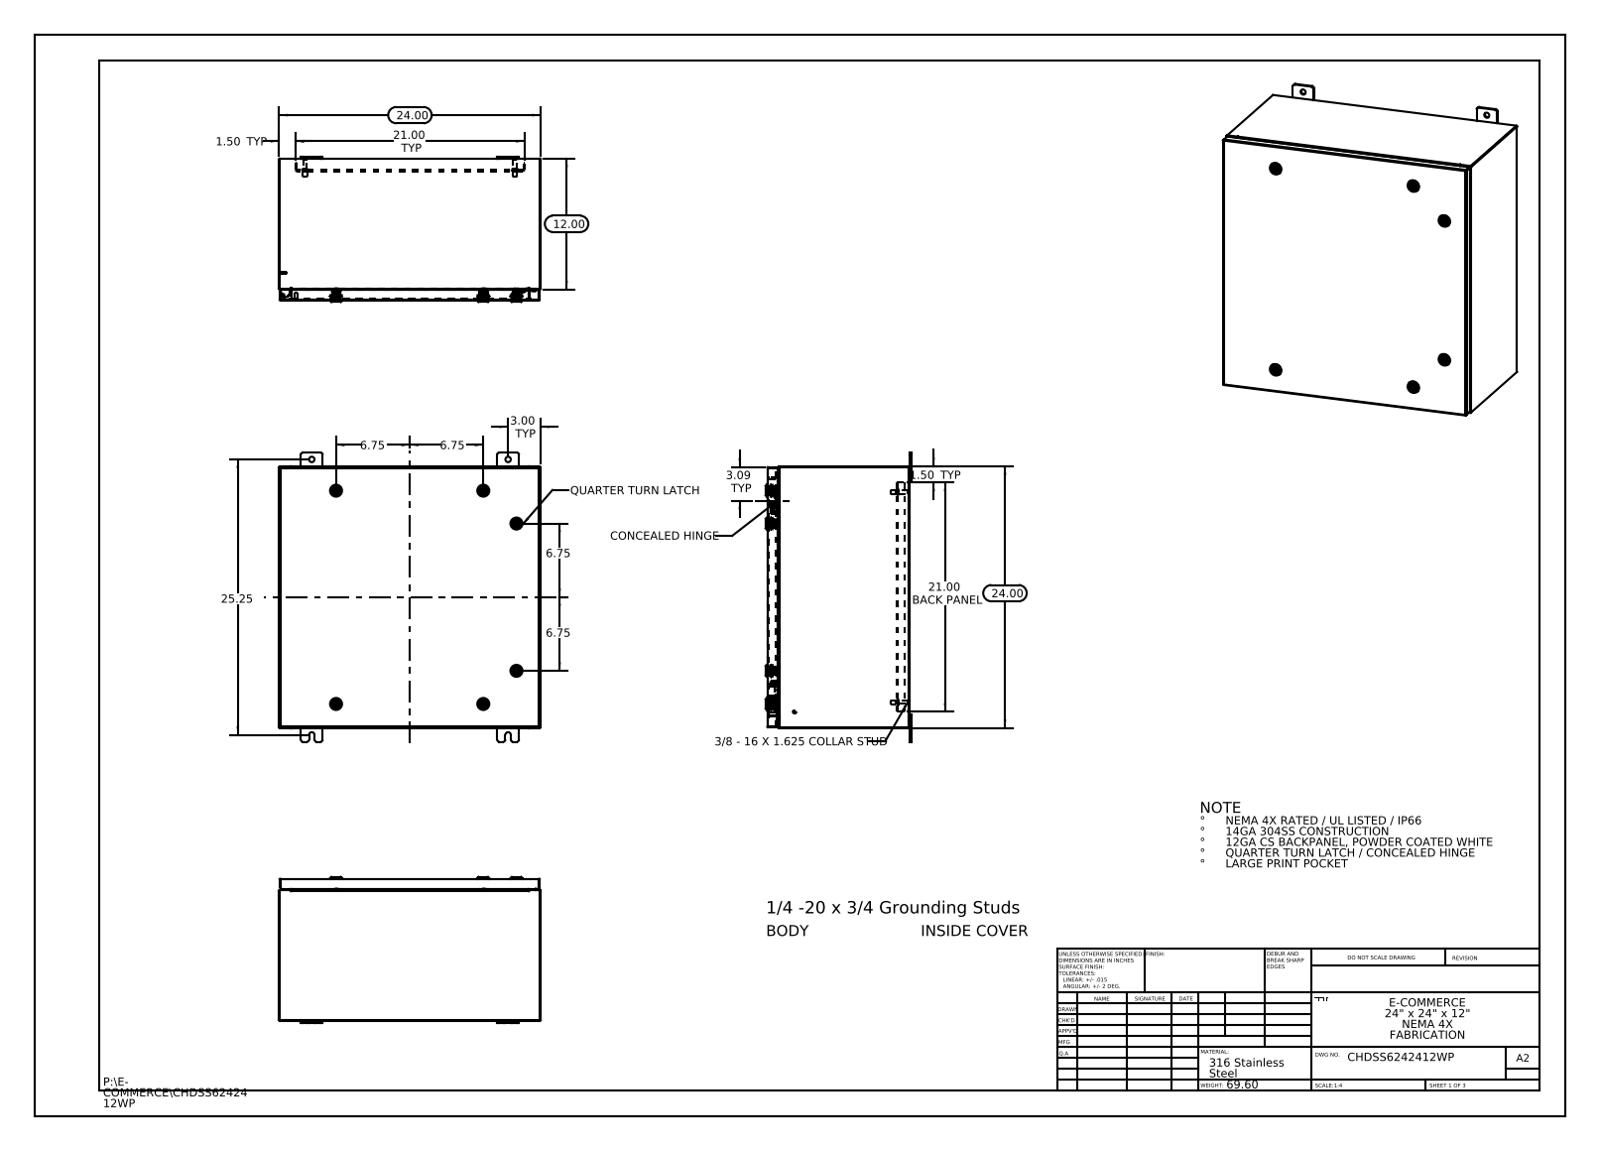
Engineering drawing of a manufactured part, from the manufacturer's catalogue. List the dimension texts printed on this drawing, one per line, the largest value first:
25.25
24.00
24.00
21.00 TYP
21.00 BACK PANEL
12.00
6.75
6.75
6.75
6.75
3.09 TYP
3.00 TYP
1.50 TYP
1.50 TYP
